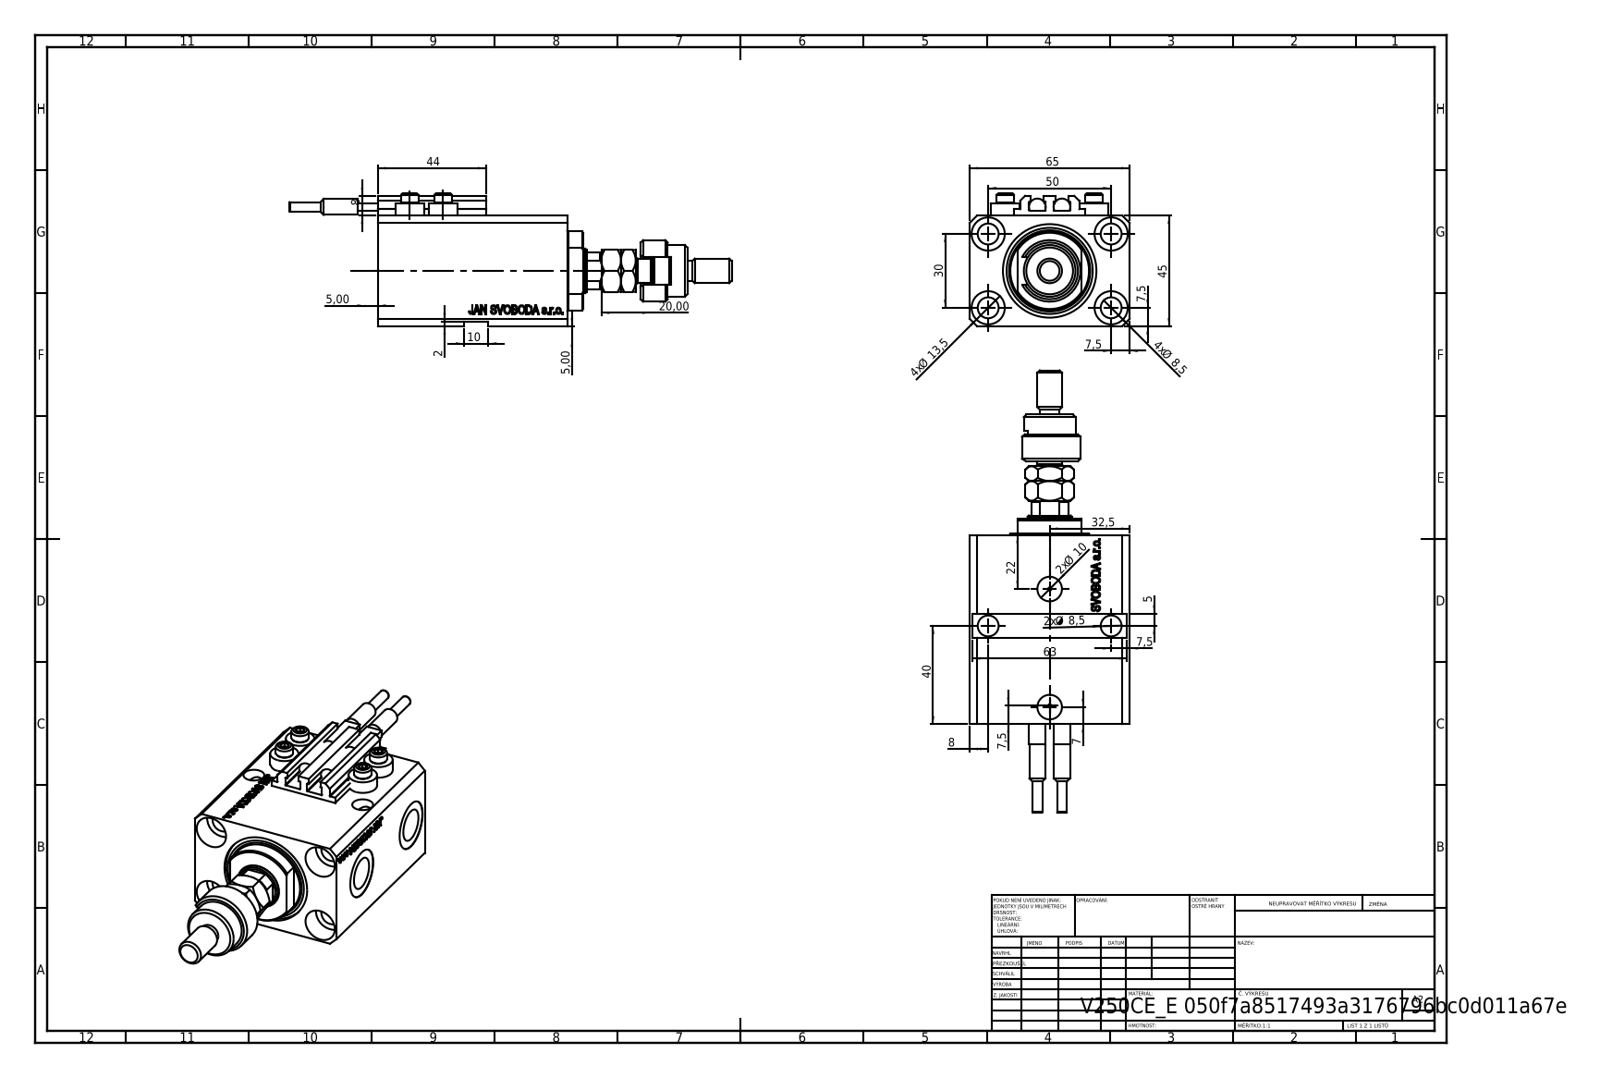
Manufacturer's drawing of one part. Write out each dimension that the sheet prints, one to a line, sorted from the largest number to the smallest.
65
63
50
45
44
40
32,5
30
22
20,00
4x Ø 13,5
10
2x Ø 10
4x Ø 8,5
2x Ø 8,5
8
8
7,5
7,5
7,5
7,5
7
5,00
5,00
5
2
